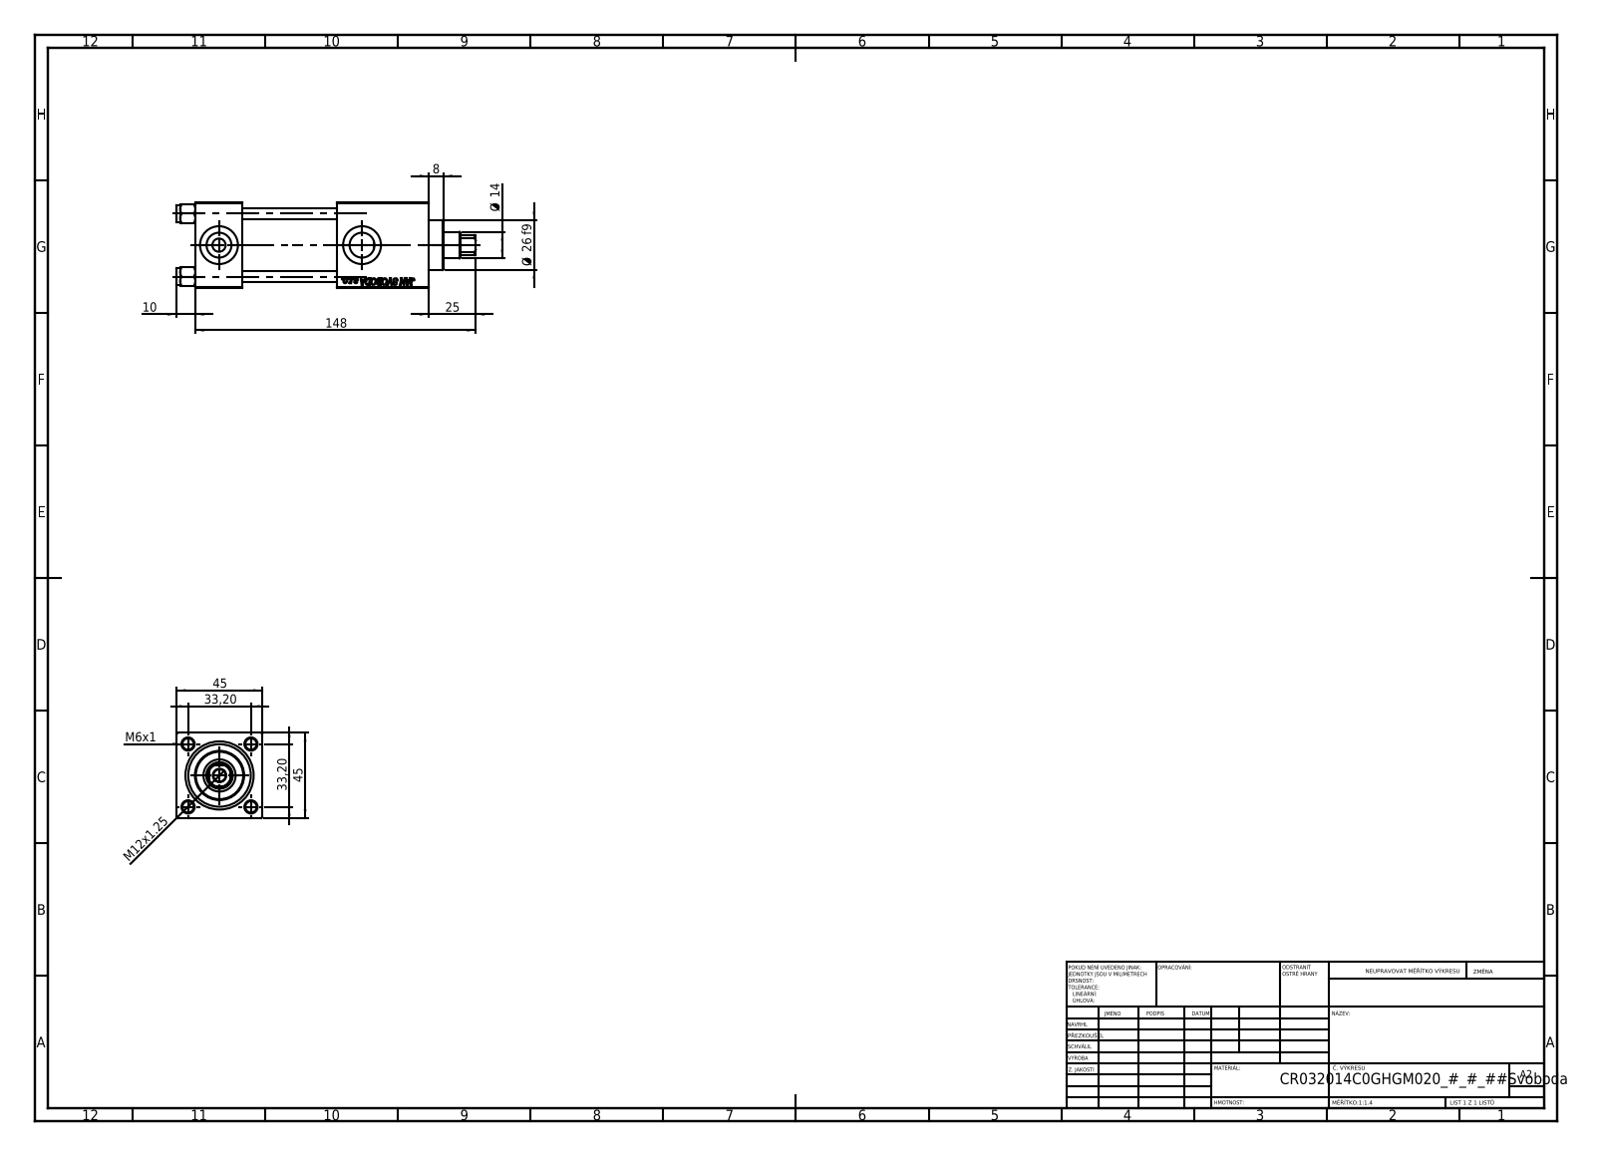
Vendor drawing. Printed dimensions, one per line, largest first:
148
45
45
33,20
33,20
Ø 26 f9
25
Ø 14
M12x1.25
10
8
M6x1
